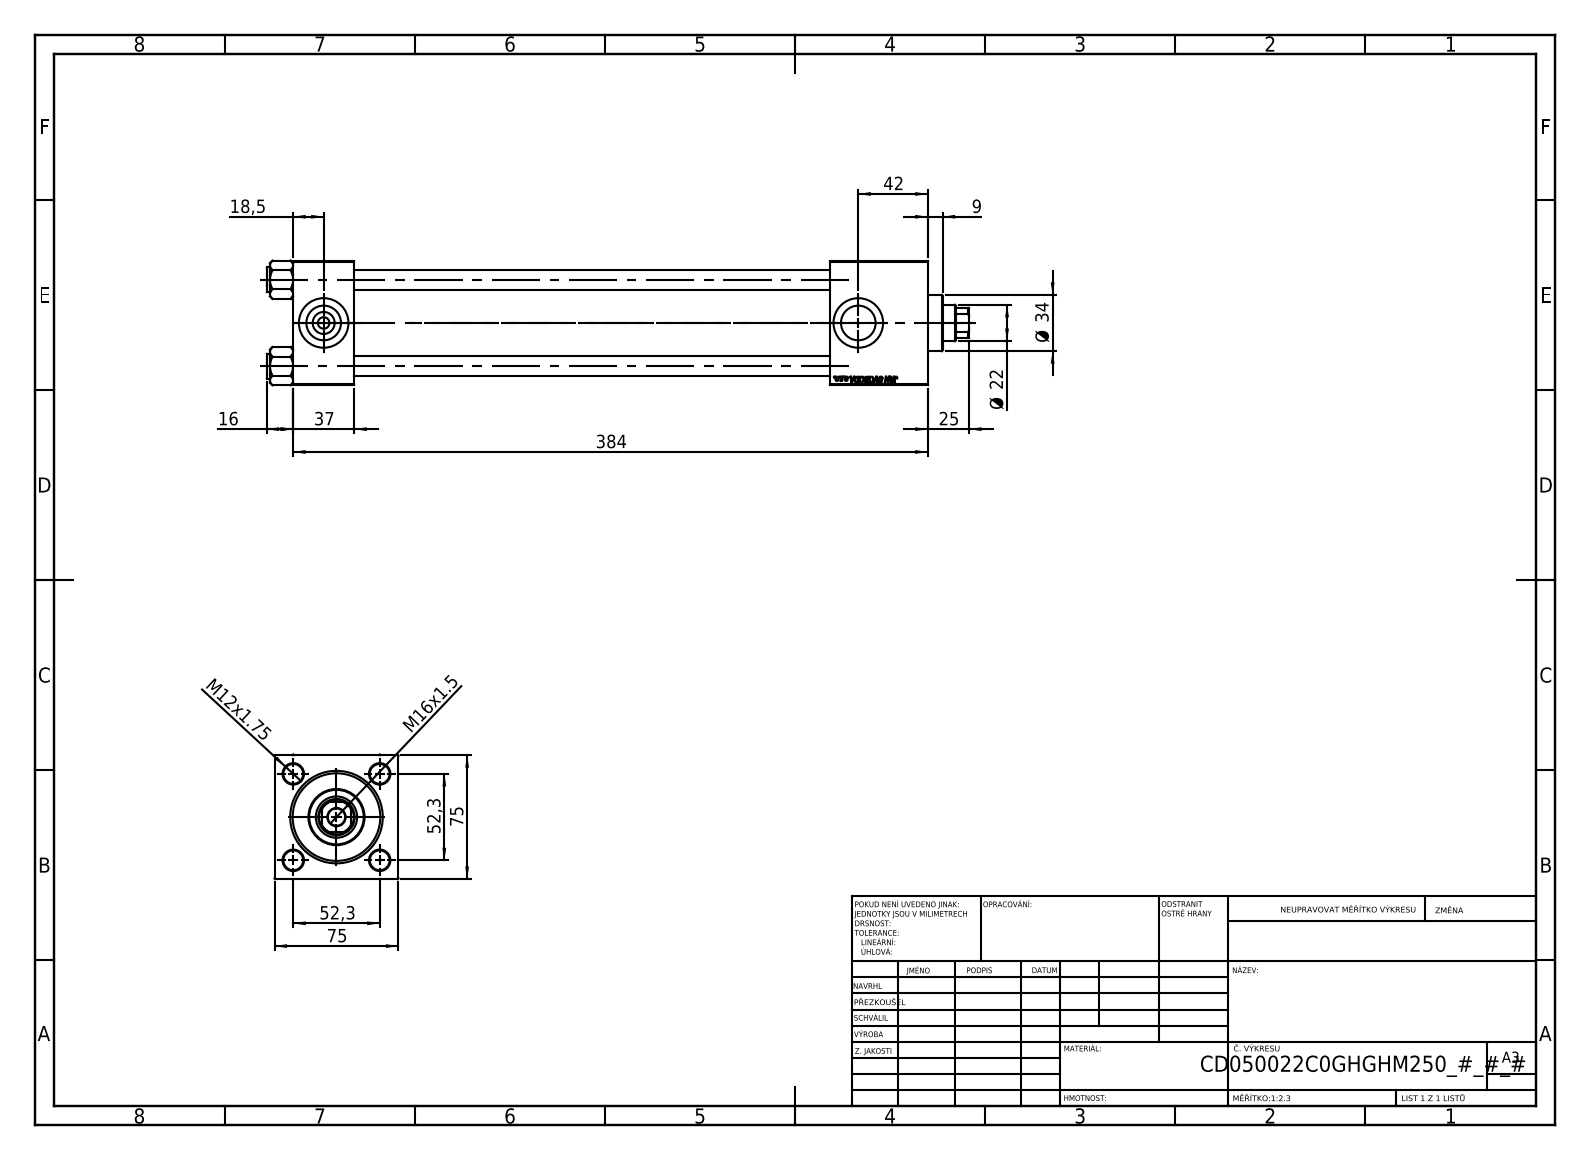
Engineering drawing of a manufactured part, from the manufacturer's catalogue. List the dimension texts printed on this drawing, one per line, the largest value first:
384
75
75
52,3
52,3
42
37
Ø 34
25
Ø 22
18,5
16
M16x1.5
M12x1.75
9
